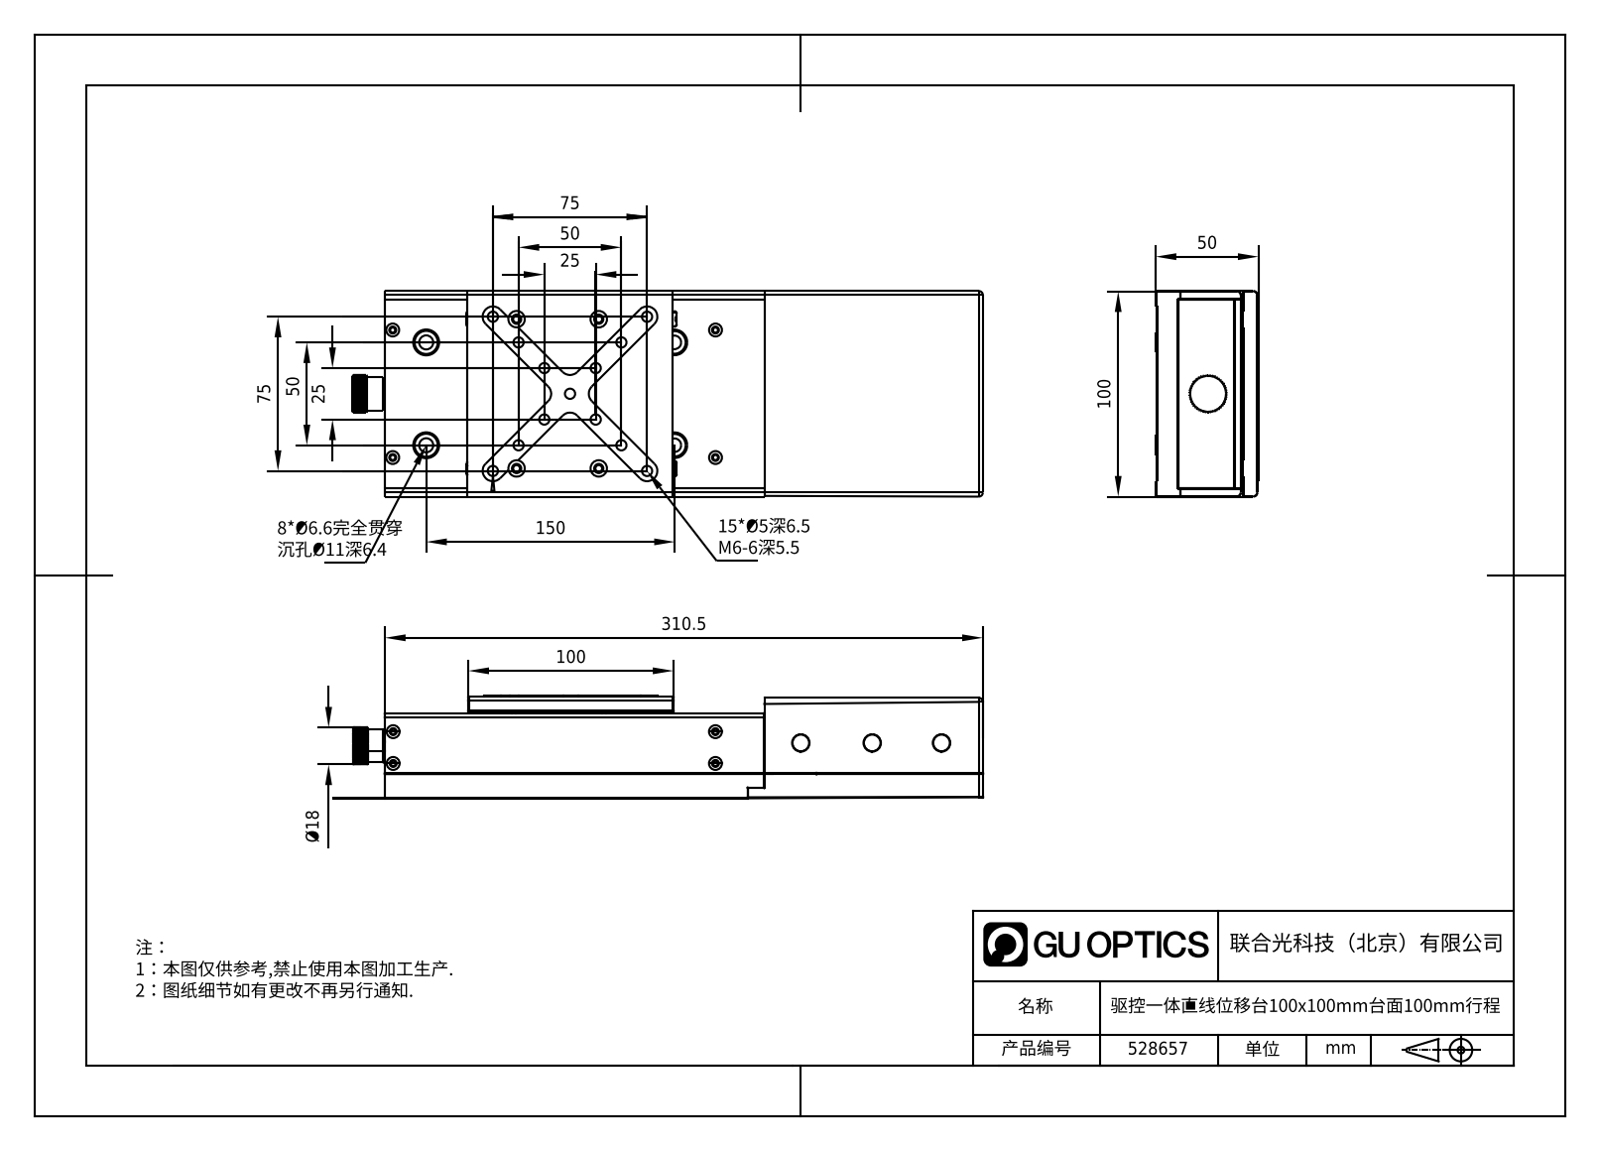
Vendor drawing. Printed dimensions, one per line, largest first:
310.5
150
100
100
75
75
50
50
50
25
25
Ø18
